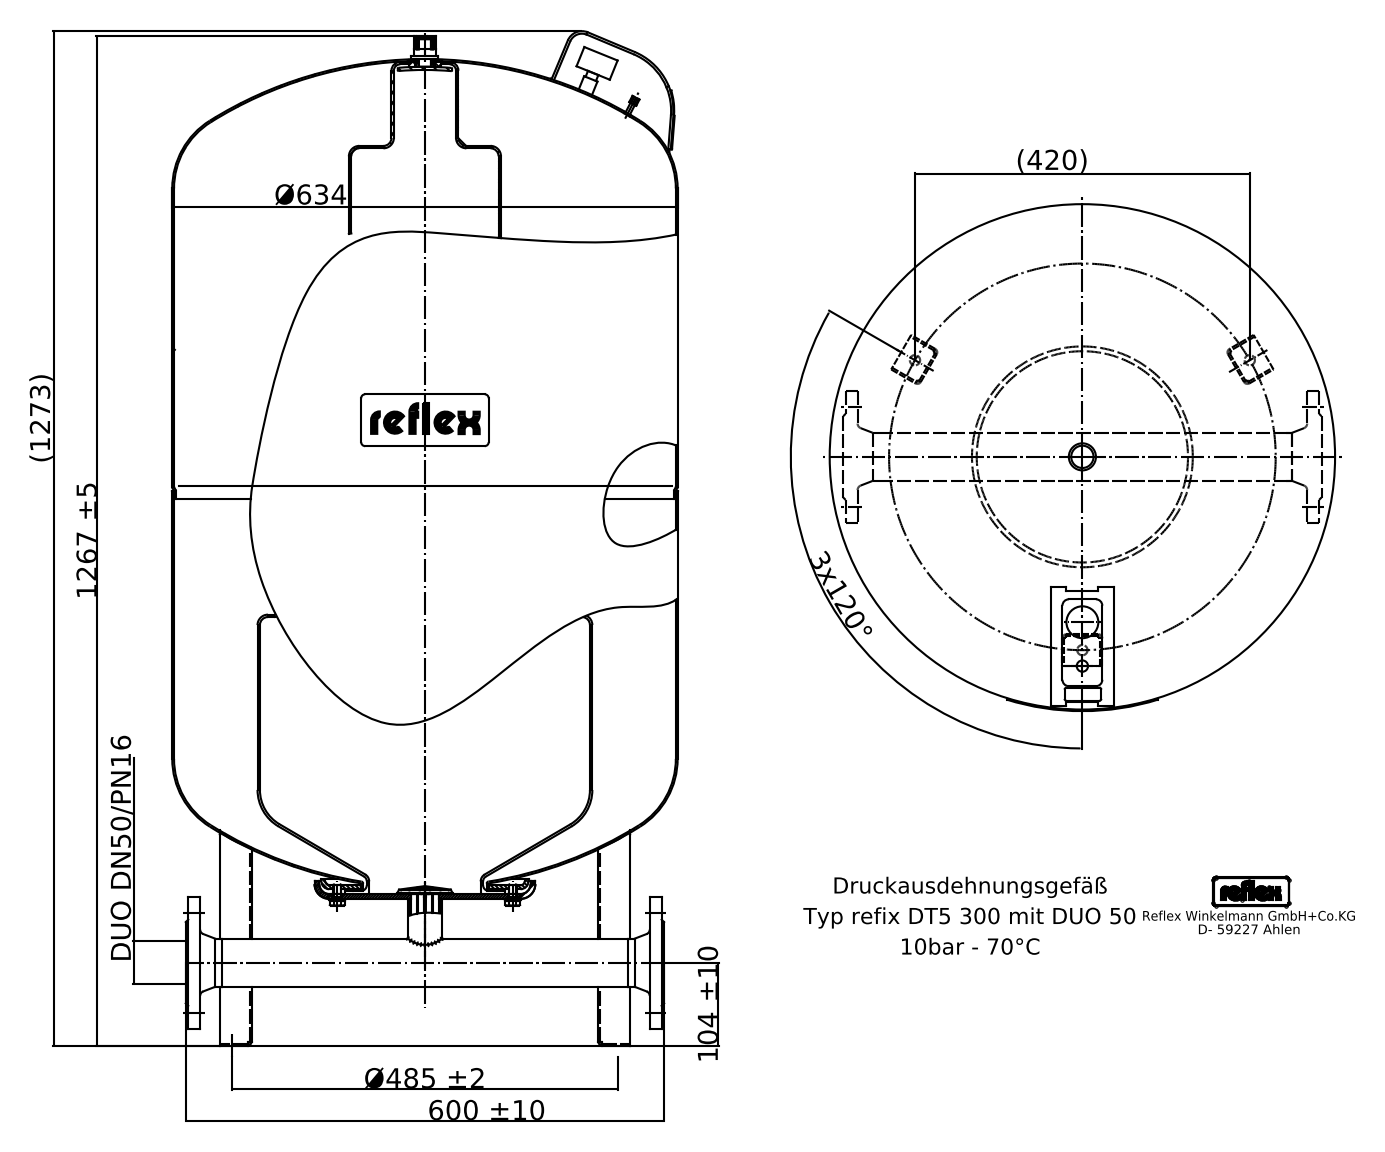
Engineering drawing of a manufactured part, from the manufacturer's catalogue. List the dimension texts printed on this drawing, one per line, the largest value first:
(1273)
1267 ±5
Ø634
600 ±10
Ø485 ±2
(420)
3x120°
104 ±10
DUO DN50/PN16
